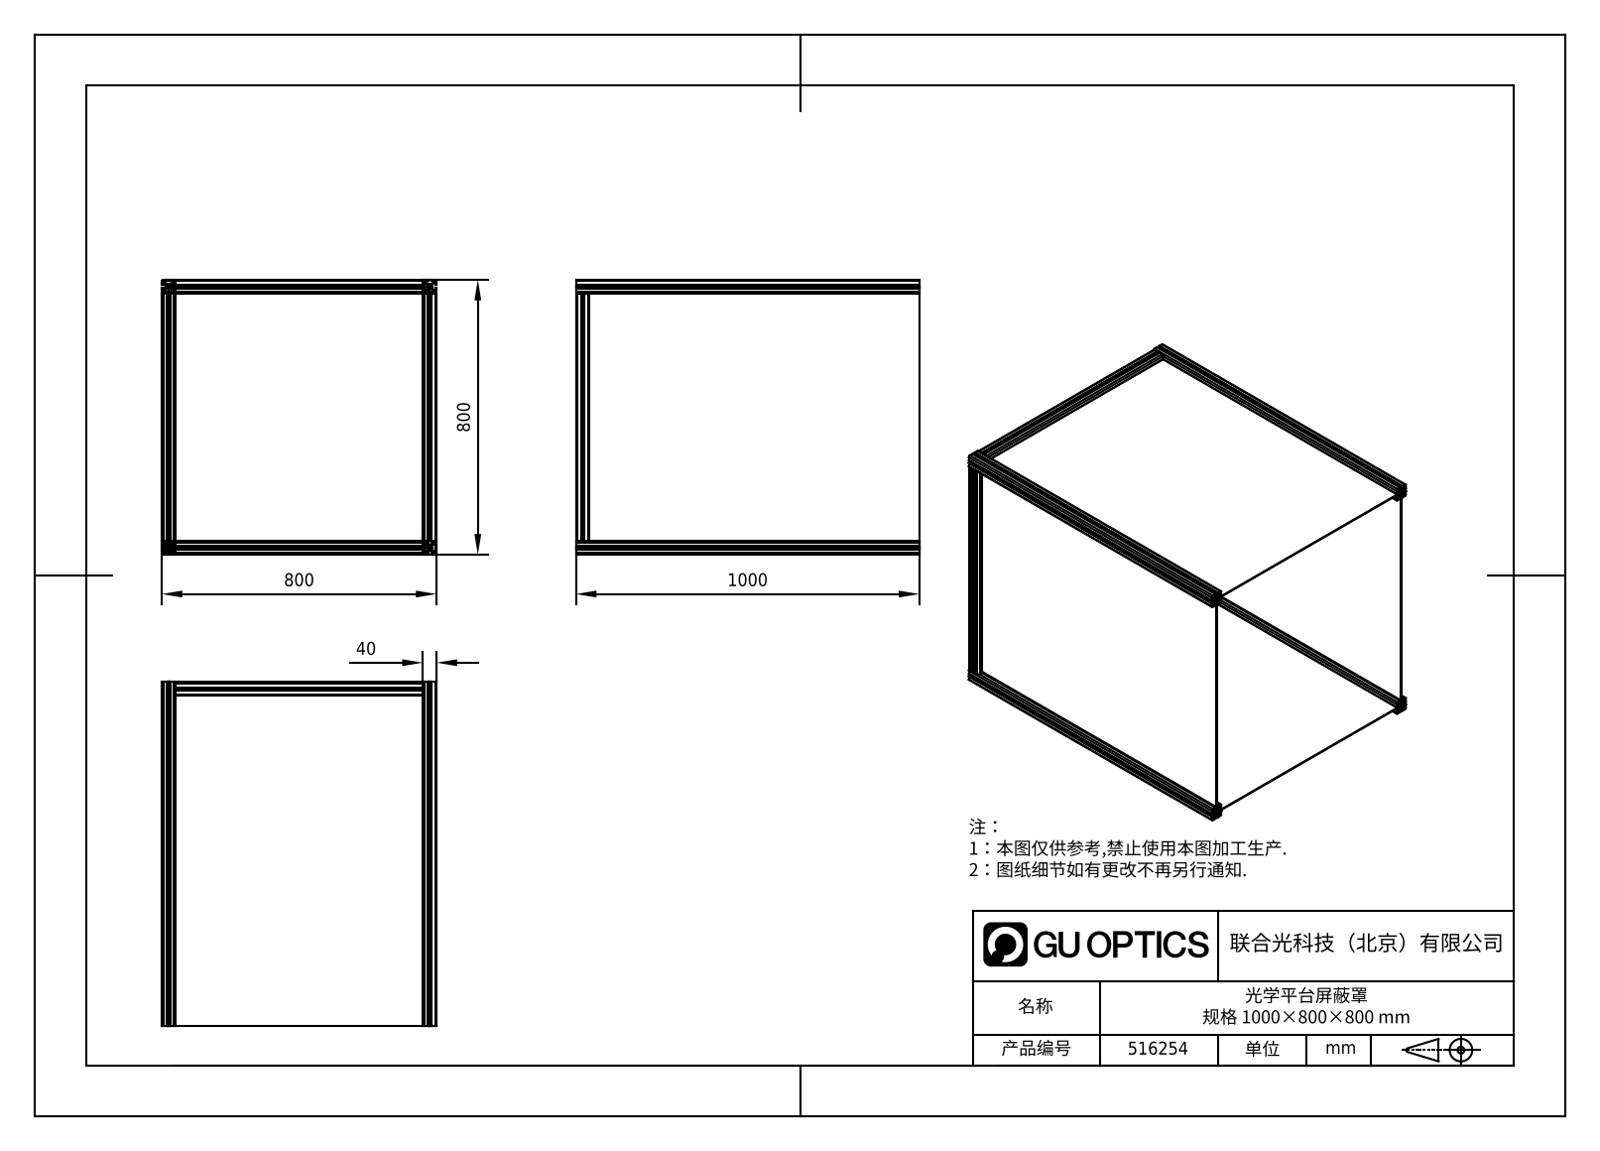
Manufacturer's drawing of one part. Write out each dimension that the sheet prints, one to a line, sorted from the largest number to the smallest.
1000
800
800
40
